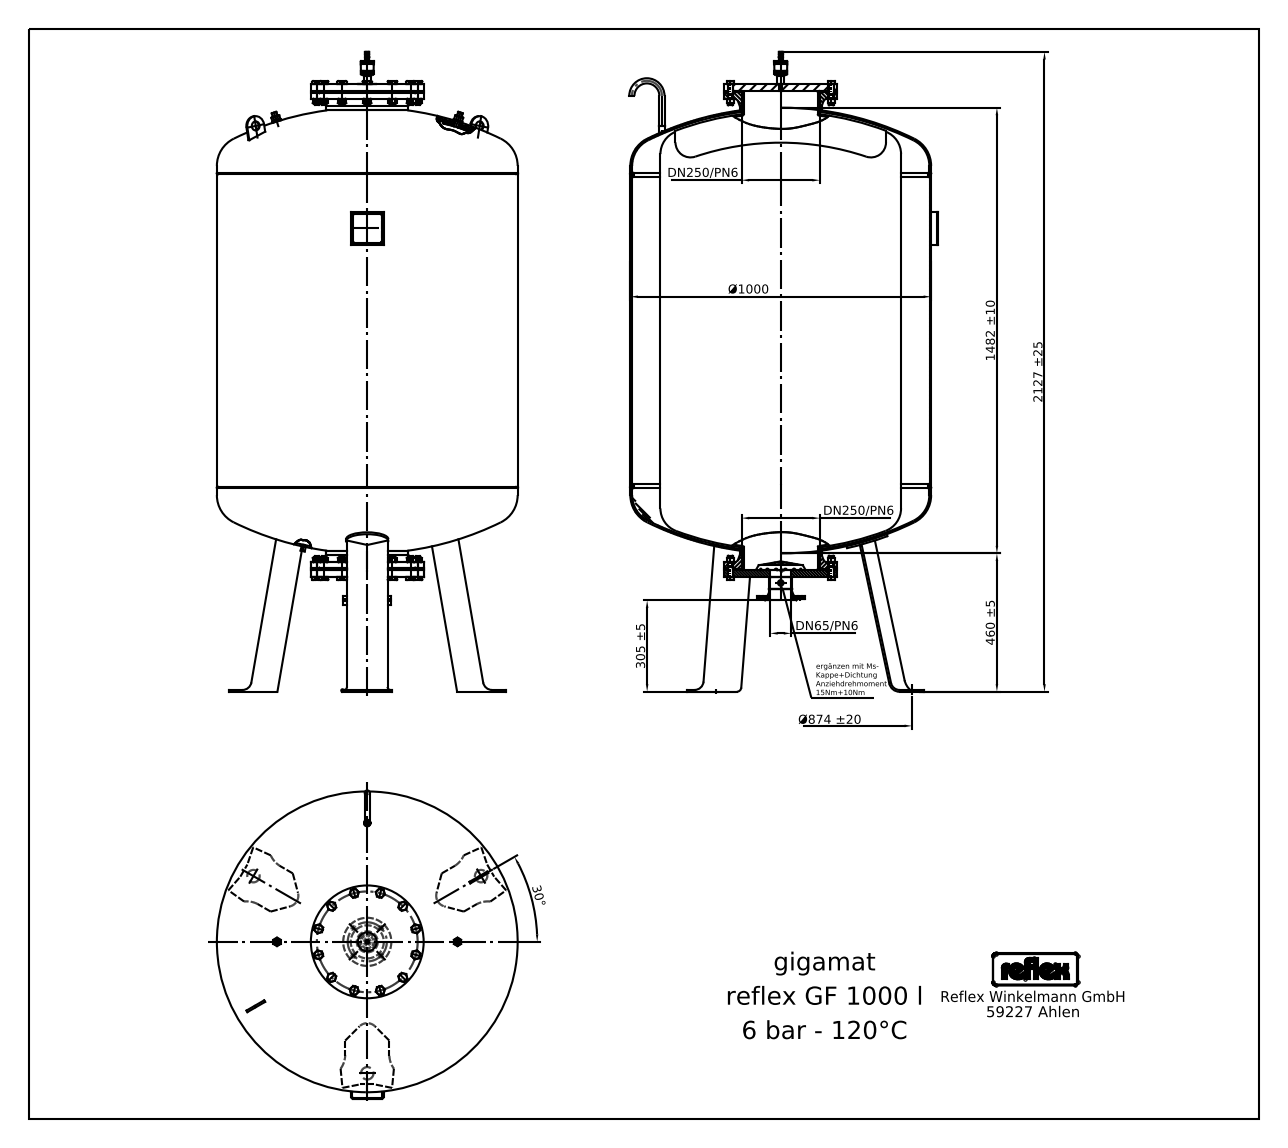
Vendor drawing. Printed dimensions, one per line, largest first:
2127 ±25
1482 ±10
Ø1000
Ø874 ±20
460 ±5
305 ±5
DN250/PN6
DN250/PN6
DN65/PN6
30°
